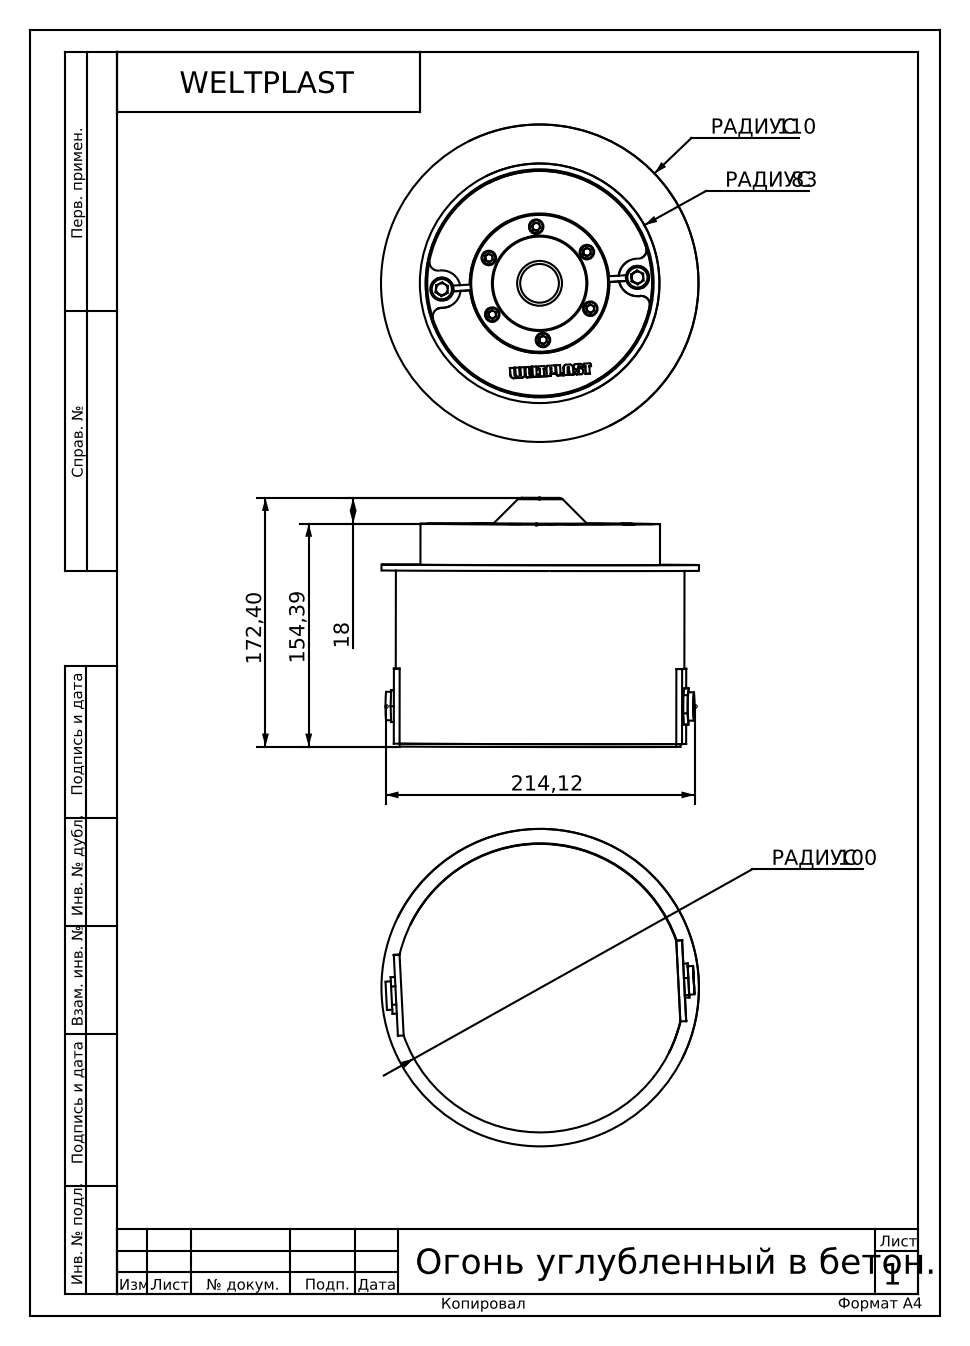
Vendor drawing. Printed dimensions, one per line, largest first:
214,12
172,40
154,39
РАДИУС 110
РАДИУС 100
РАДИУС 83
18
